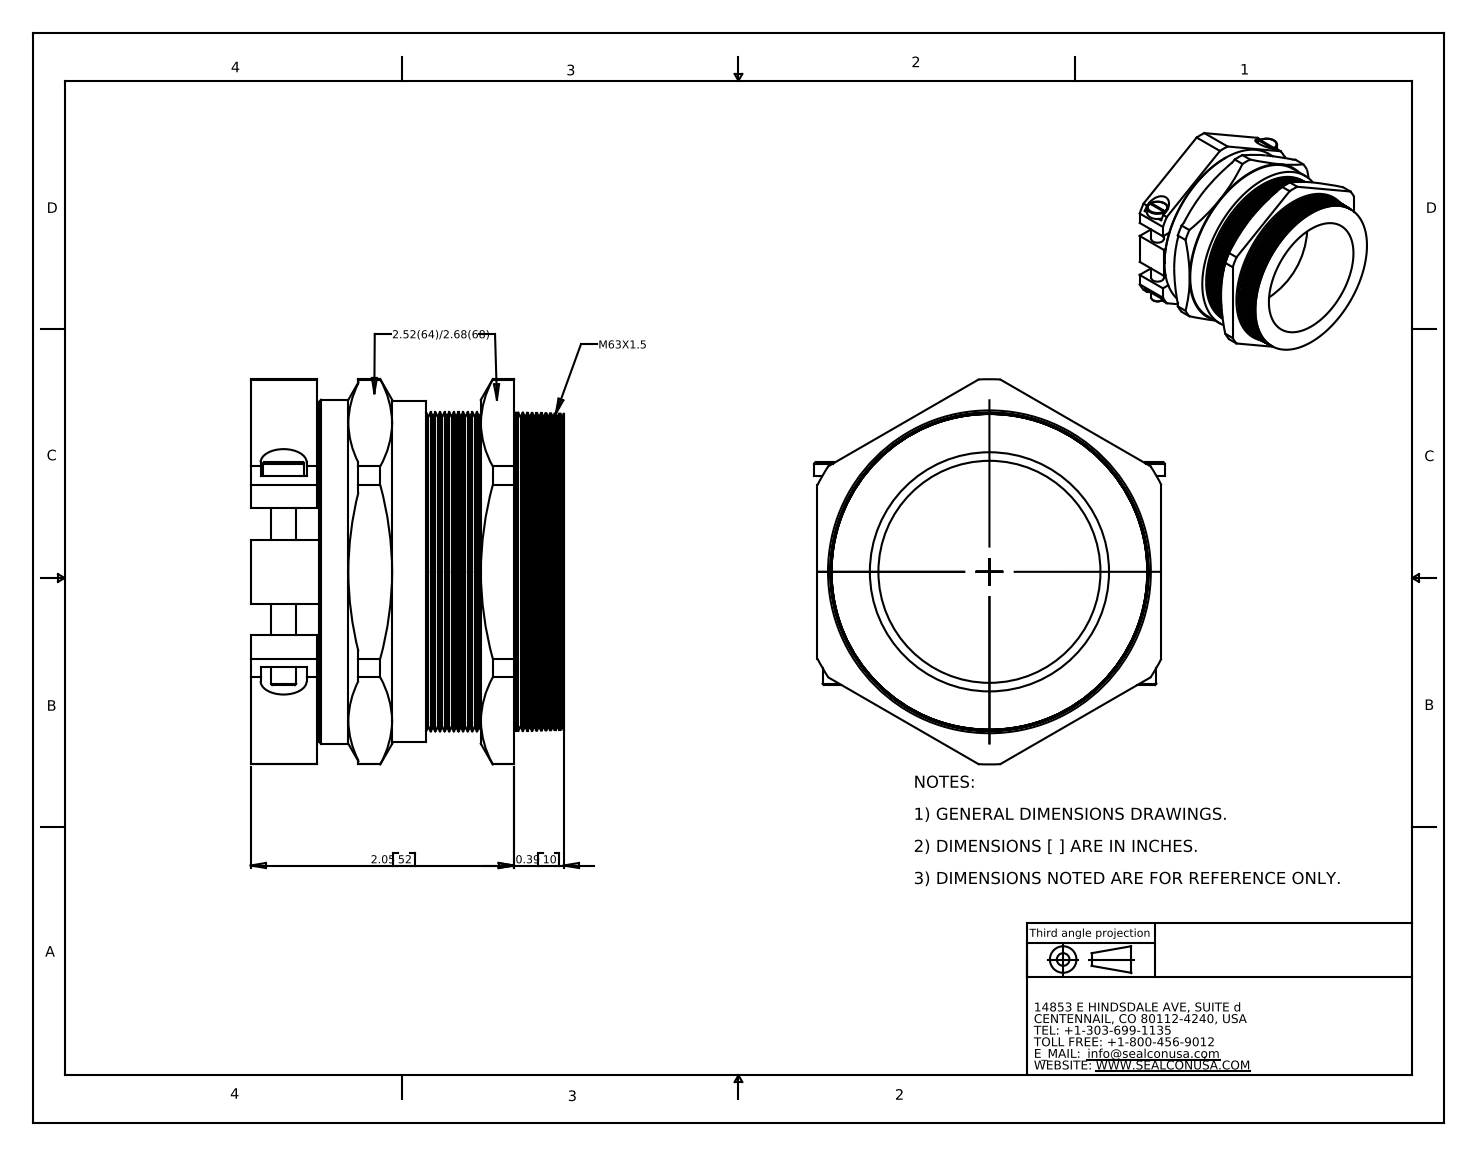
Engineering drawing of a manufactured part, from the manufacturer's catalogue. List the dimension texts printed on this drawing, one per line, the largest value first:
2.05 52
0.39 10
